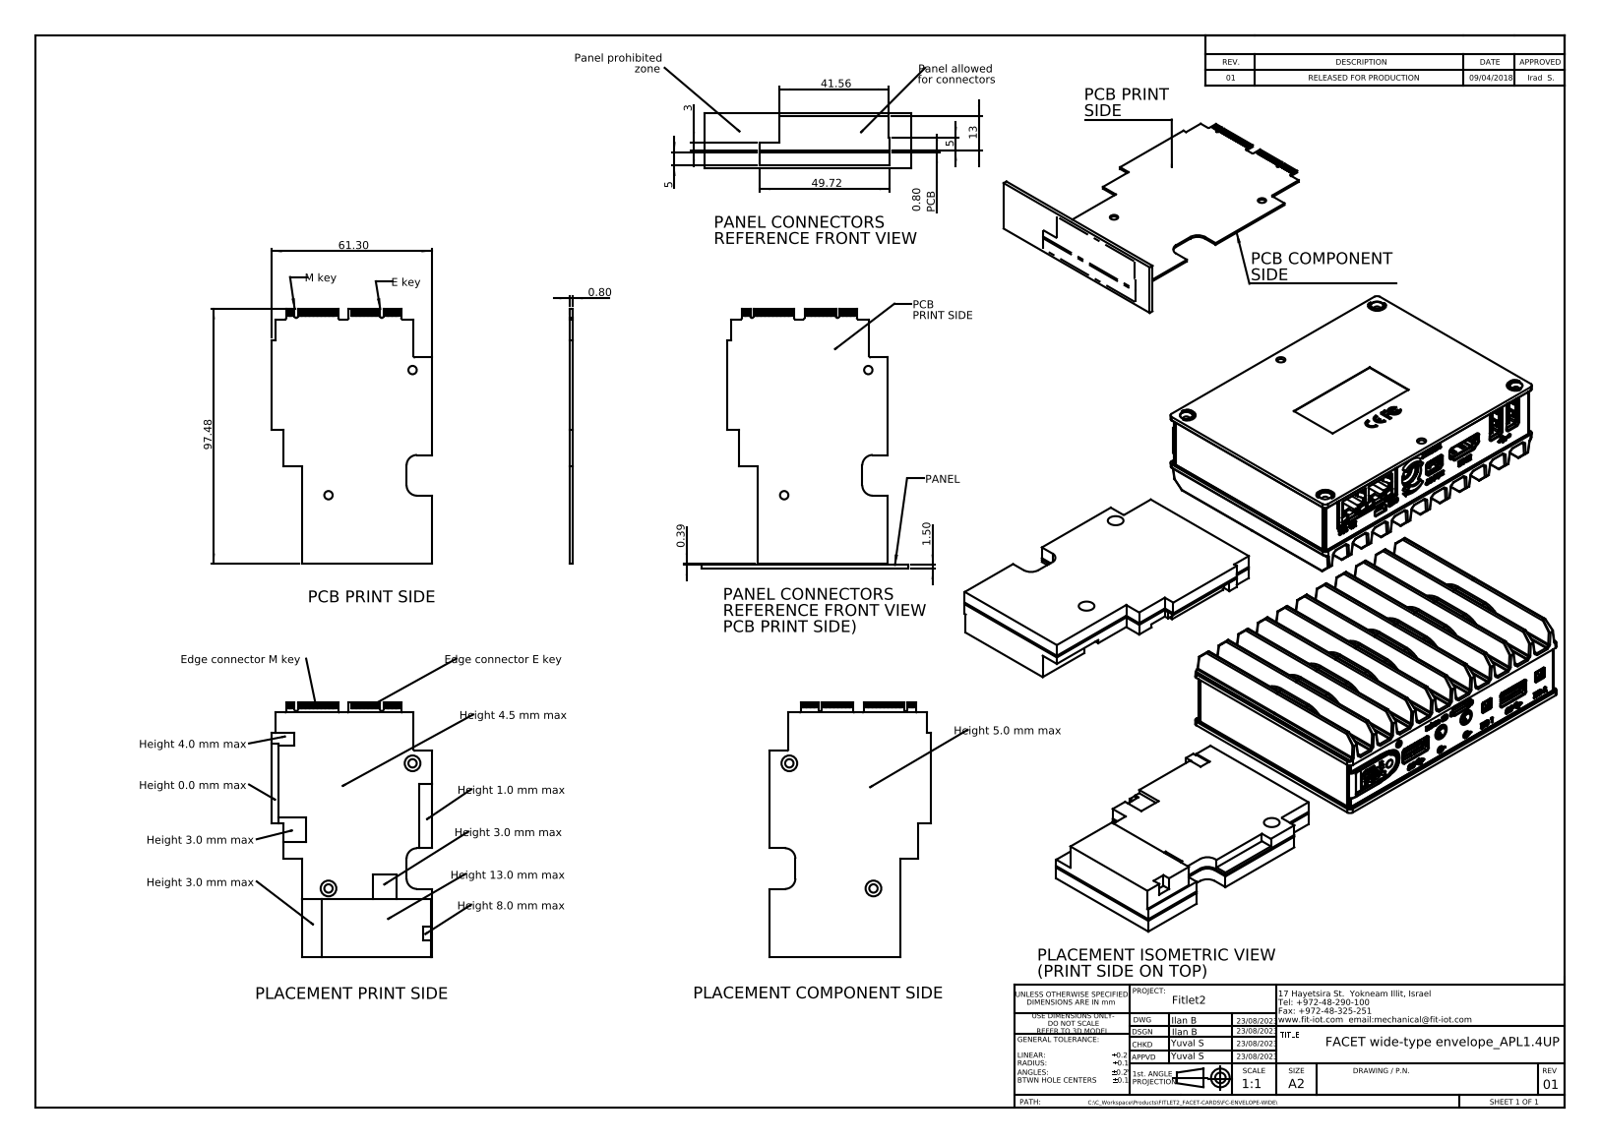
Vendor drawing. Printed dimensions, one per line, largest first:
97.48
61.30
49.72
41.56
13
5
5
3
1.50
0.80
0.80 PCB
0.39
